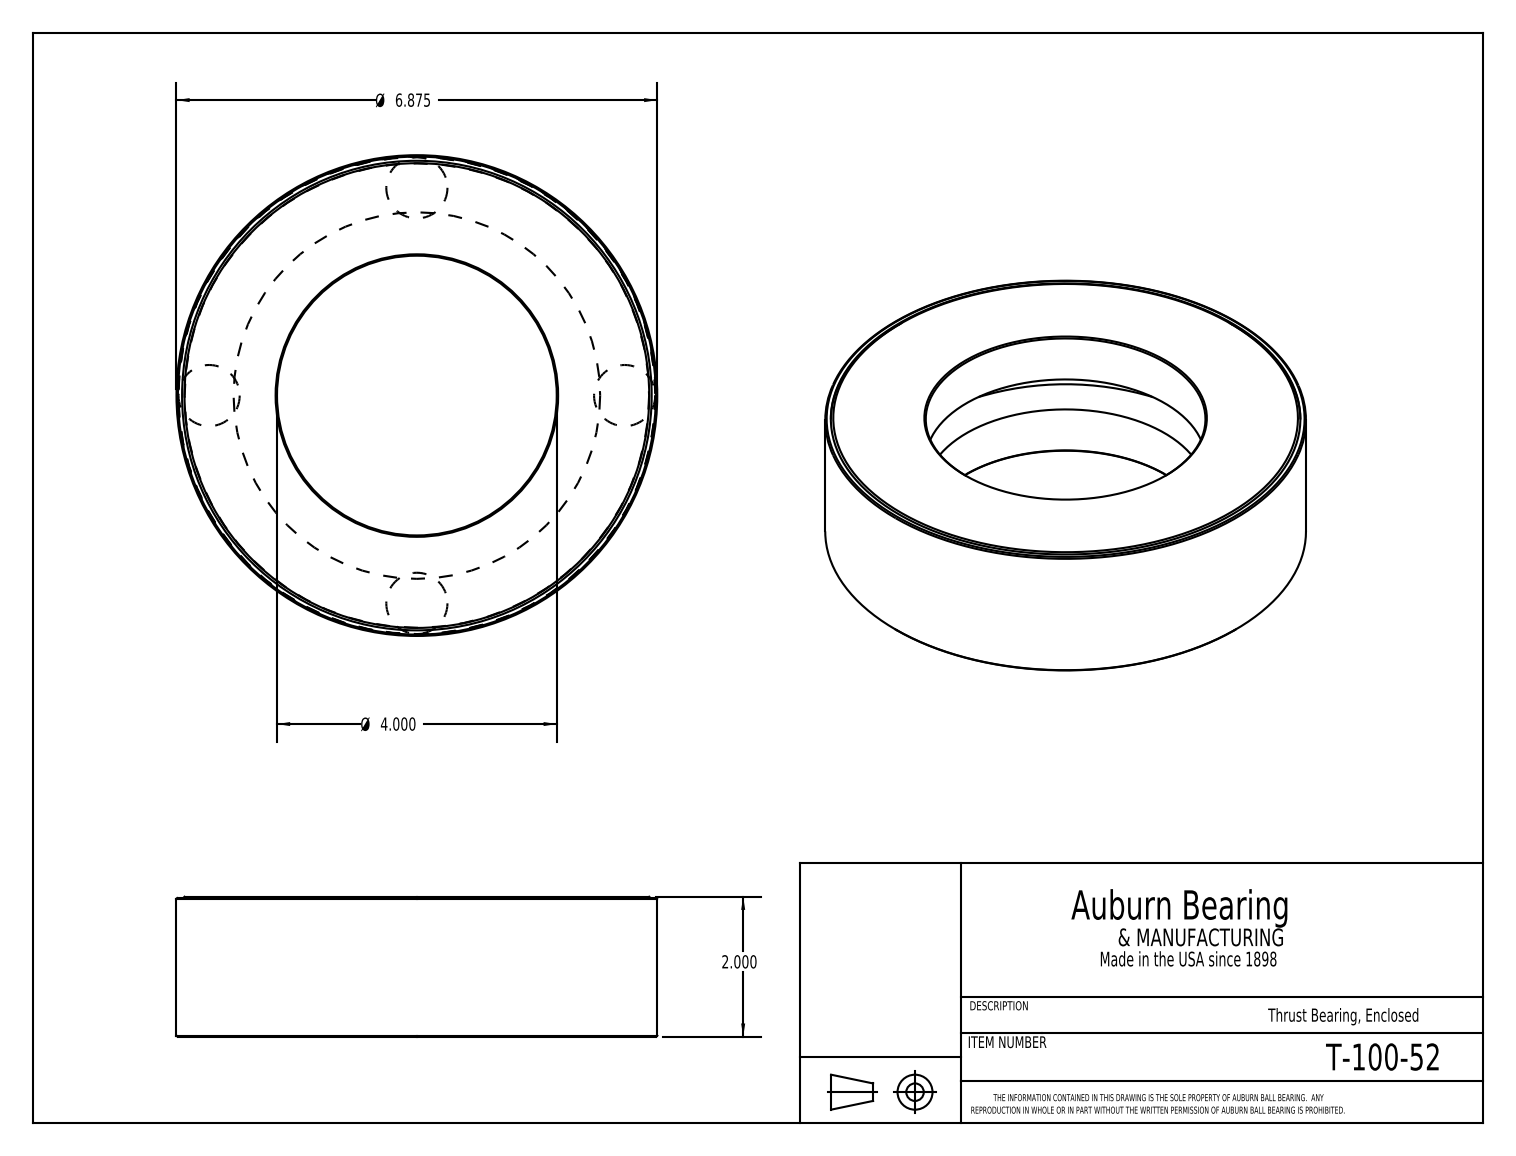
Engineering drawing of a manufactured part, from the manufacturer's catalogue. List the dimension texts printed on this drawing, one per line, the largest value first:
Ø 6.875
Ø 4.000
2.000
